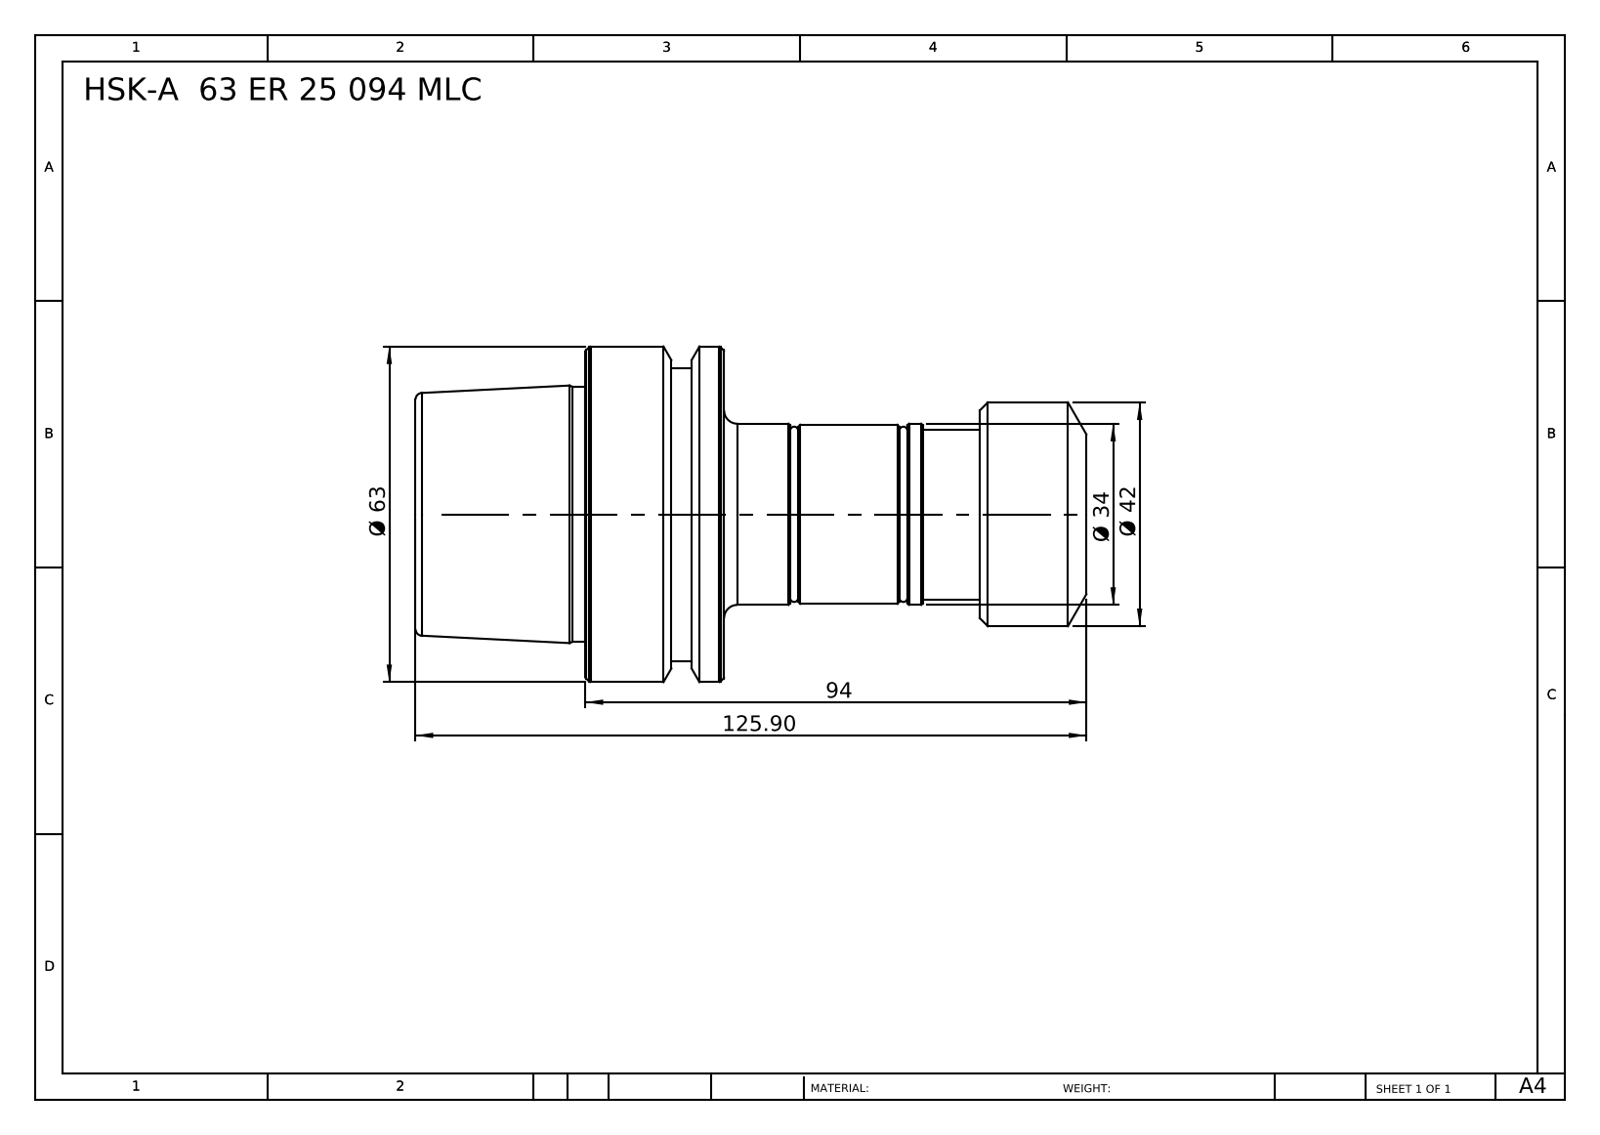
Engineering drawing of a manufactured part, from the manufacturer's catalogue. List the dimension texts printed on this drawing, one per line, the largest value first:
125.90
94
Ø 63
Ø 42
Ø 34
